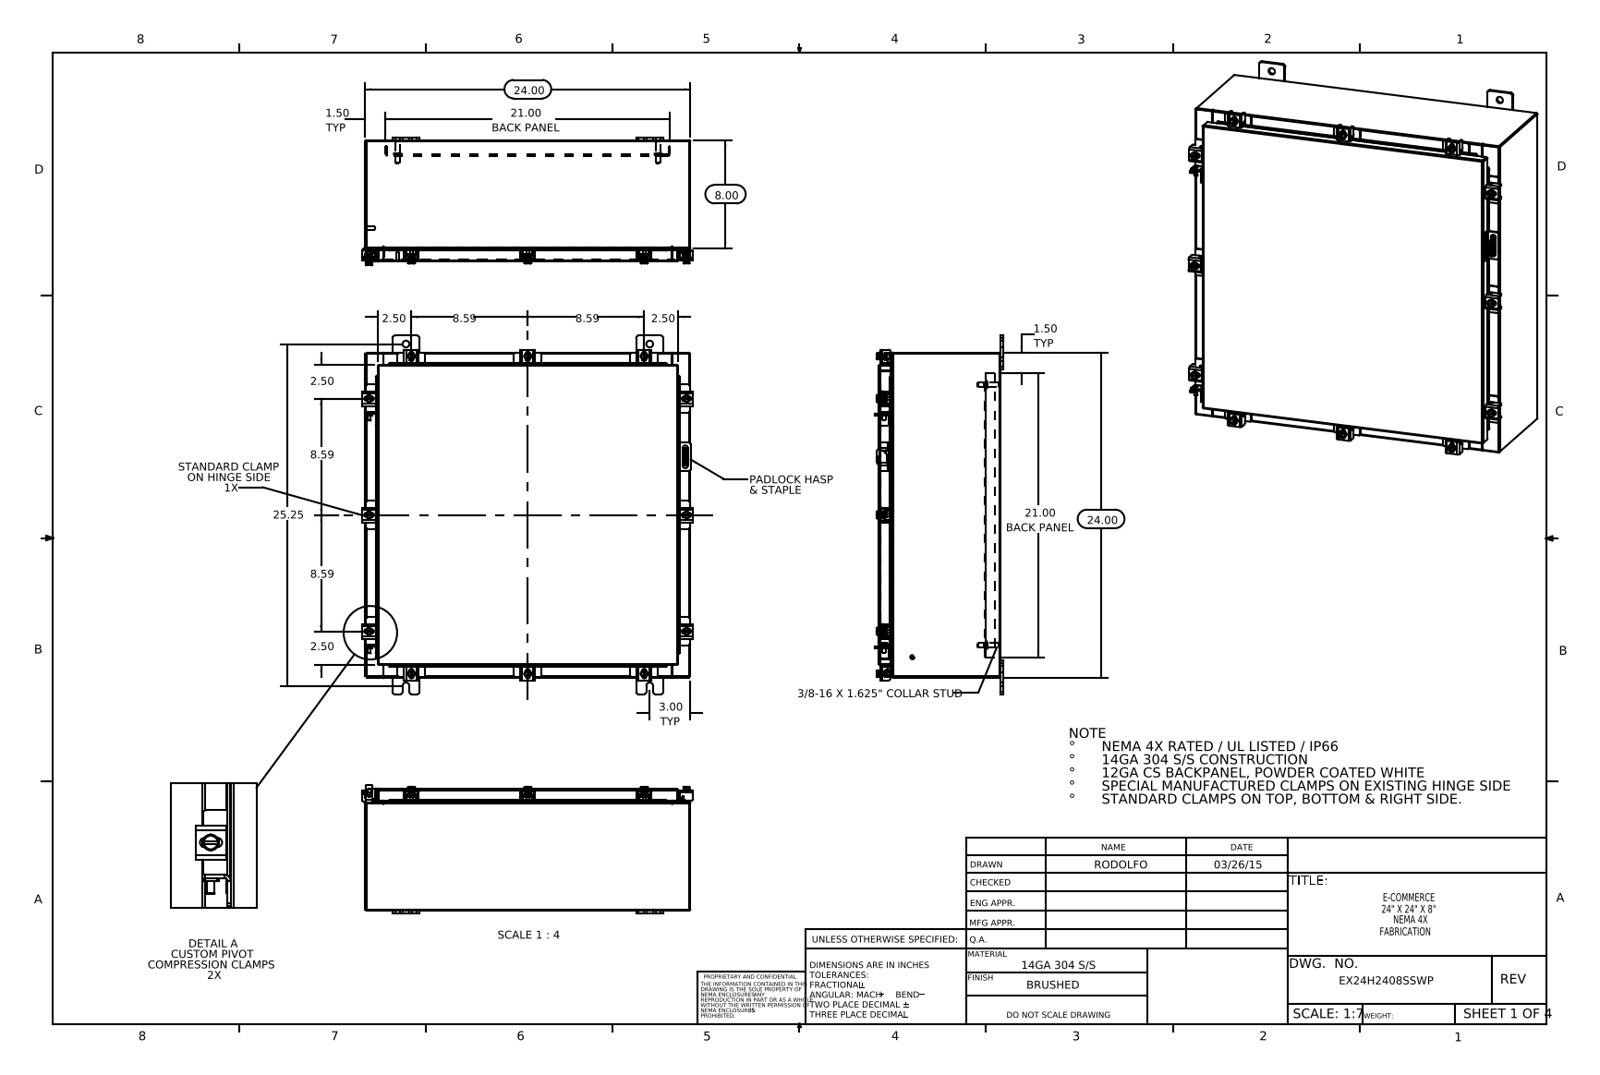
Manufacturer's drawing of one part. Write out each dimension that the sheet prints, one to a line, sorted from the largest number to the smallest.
25.25
24.00
24.00
21.00 BACK PANEL
21.00 BACK PANEL
8.59
8.59
8.59
8.59
8.00
3.00 TYP
2.50
2.50
2.50
2.50
1.50 TYP
1.50 TYP
